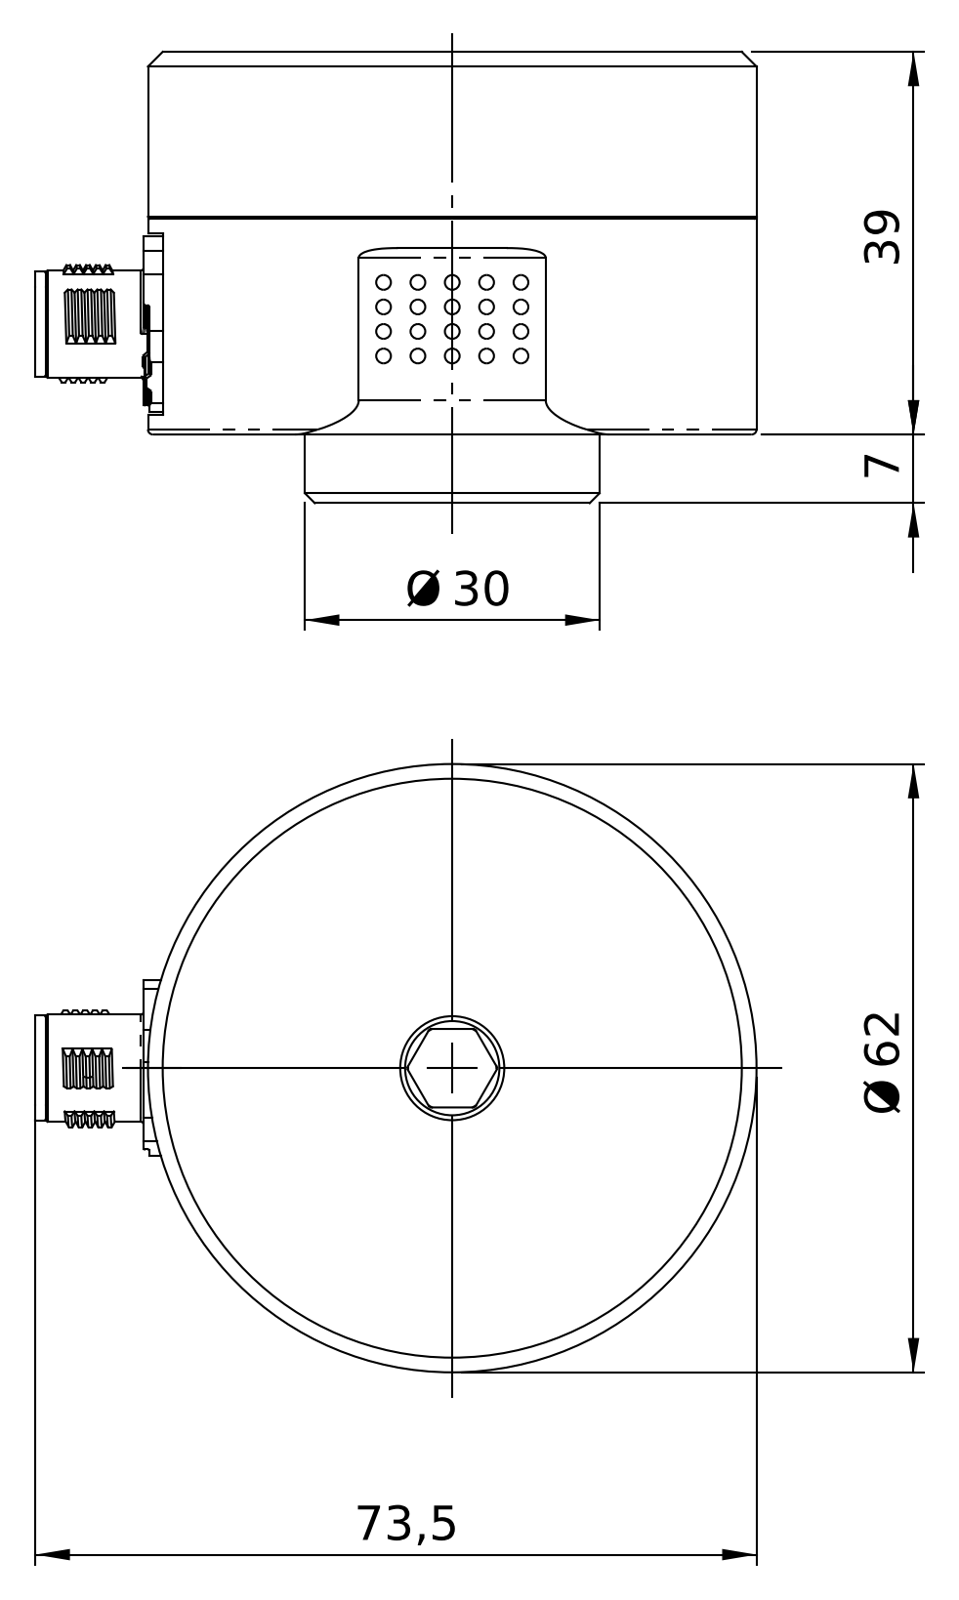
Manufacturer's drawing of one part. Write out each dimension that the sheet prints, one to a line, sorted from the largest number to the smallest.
73,5
Ø 62
39
Ø 30
7
